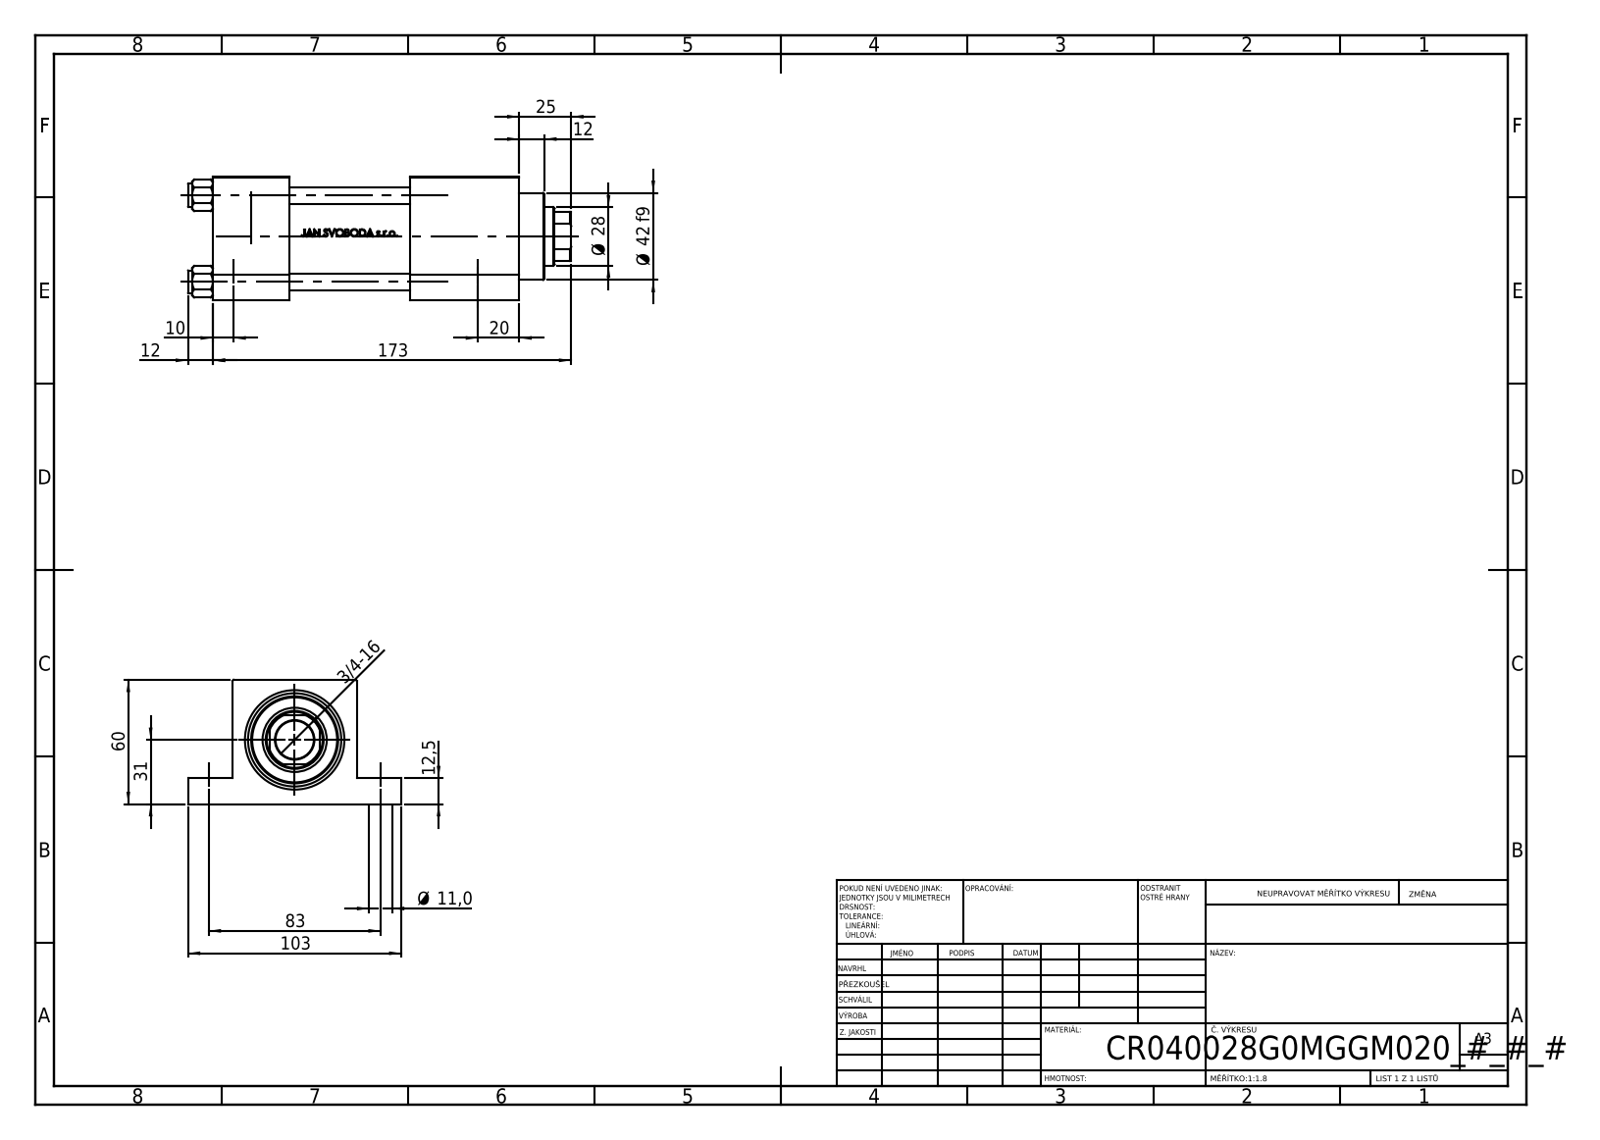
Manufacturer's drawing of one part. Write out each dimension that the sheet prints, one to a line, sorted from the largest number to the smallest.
173
103
83
60
Ø 42 f9
31
Ø 28
25
20
12,5
12
12
Ø 11,0
10
3/4-16
